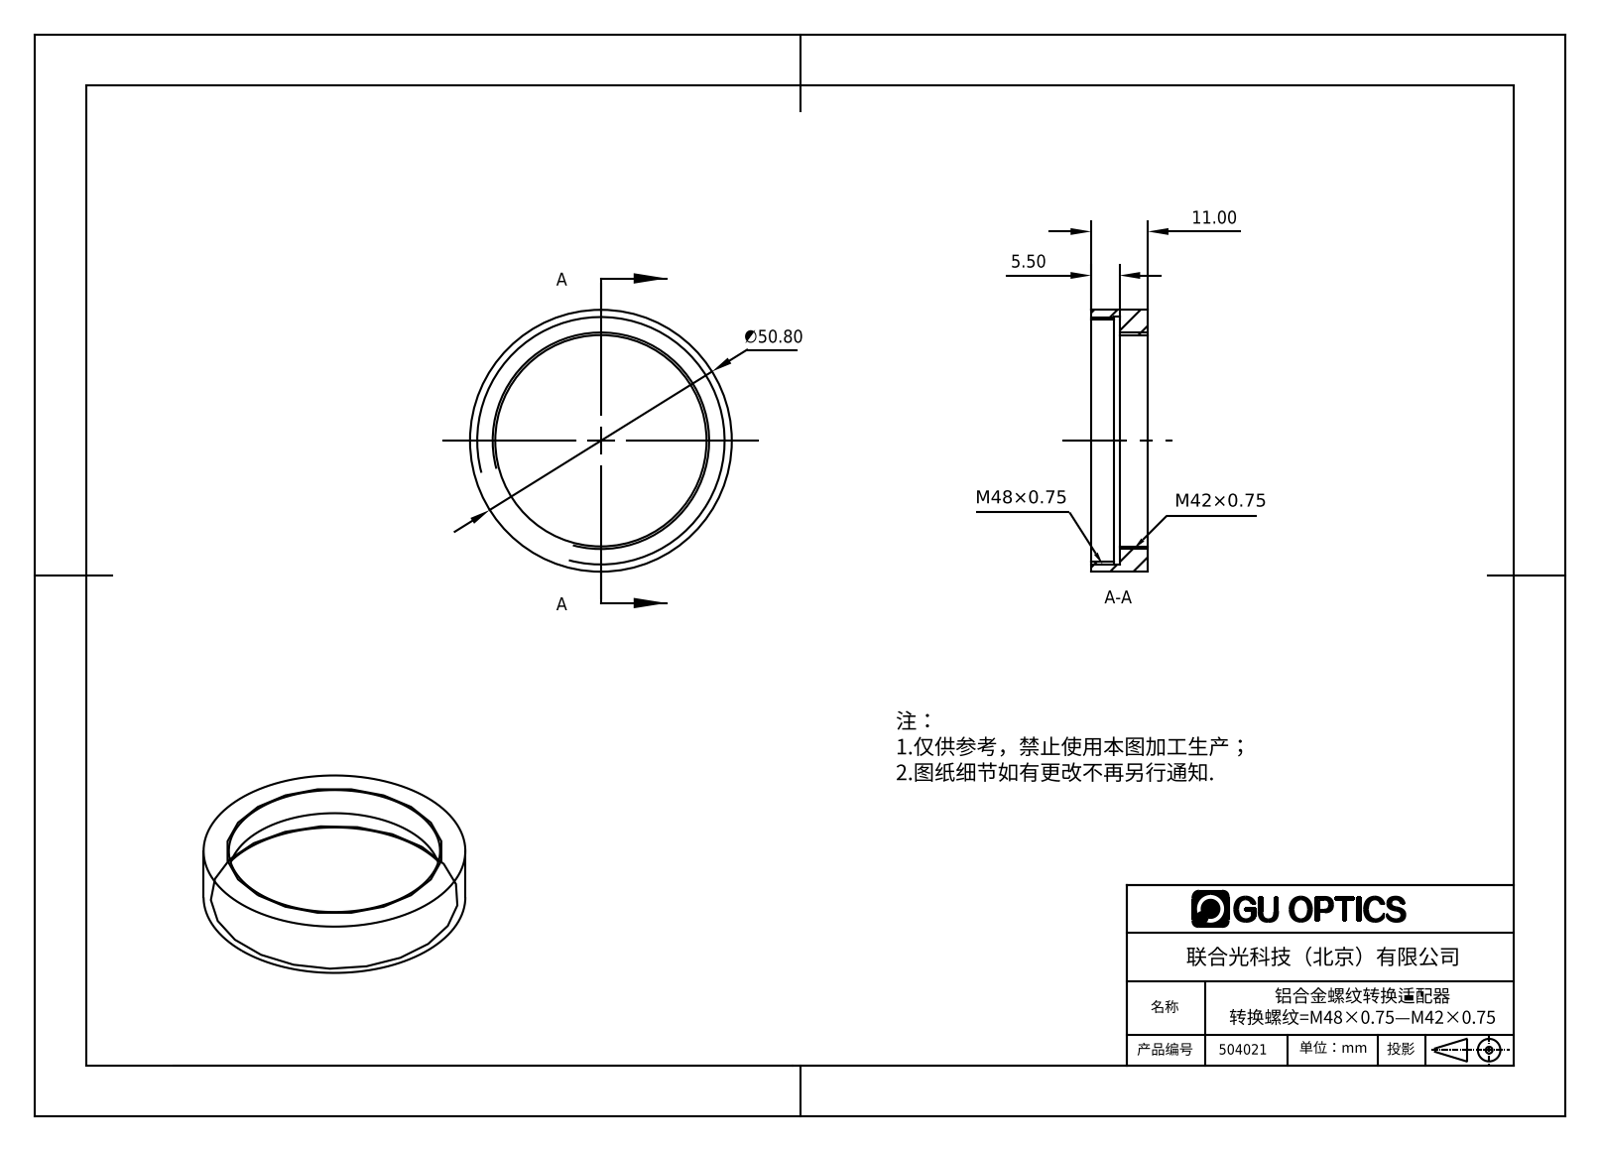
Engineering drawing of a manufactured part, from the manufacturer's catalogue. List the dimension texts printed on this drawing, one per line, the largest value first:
∅50.80
11.00
5.50
